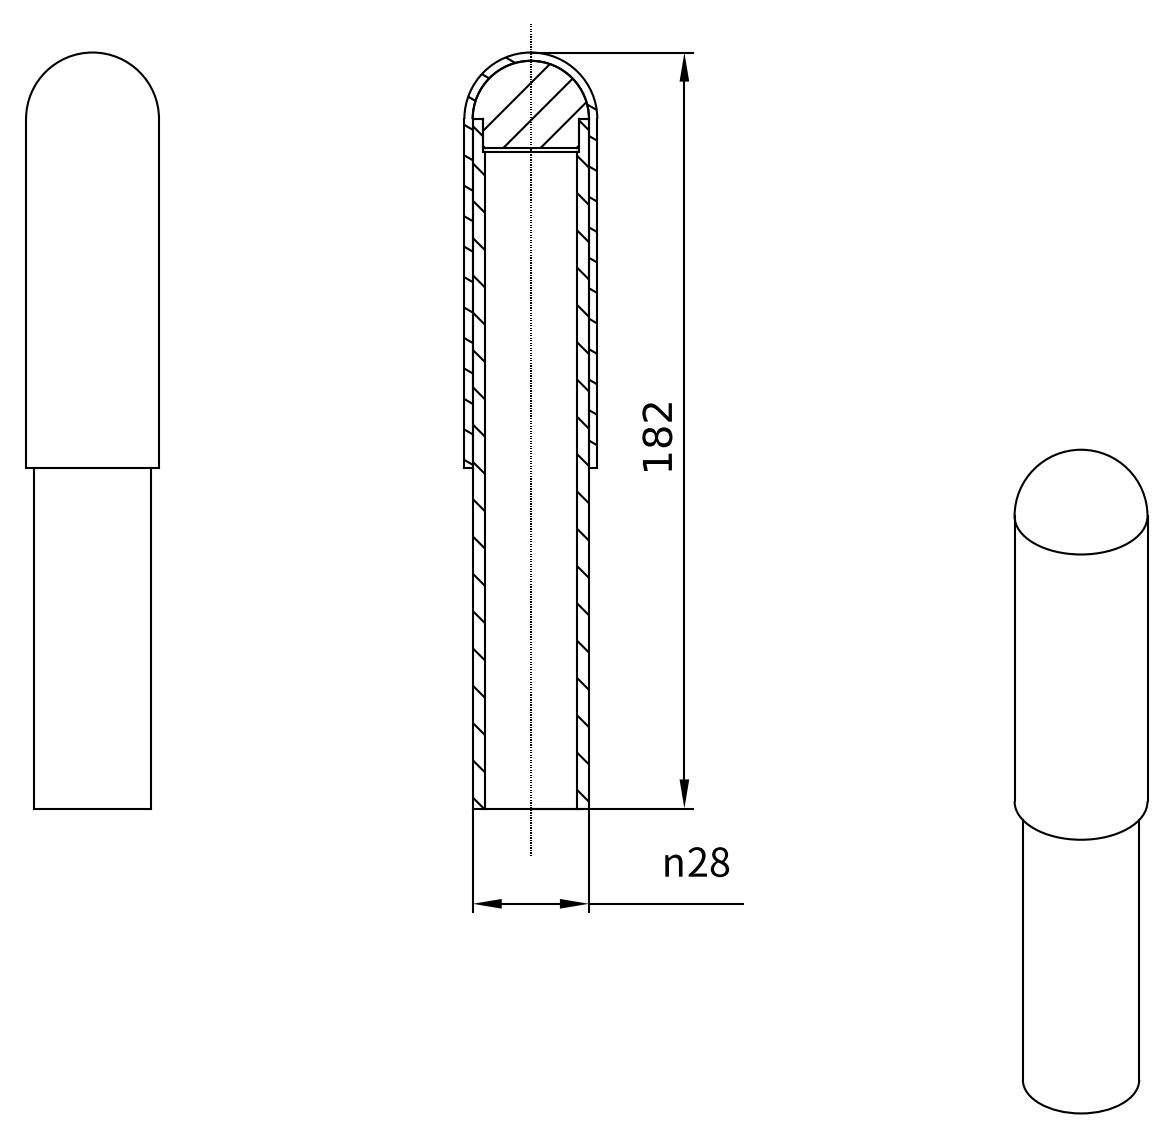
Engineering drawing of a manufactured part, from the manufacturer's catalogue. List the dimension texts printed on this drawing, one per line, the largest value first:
182
n28
